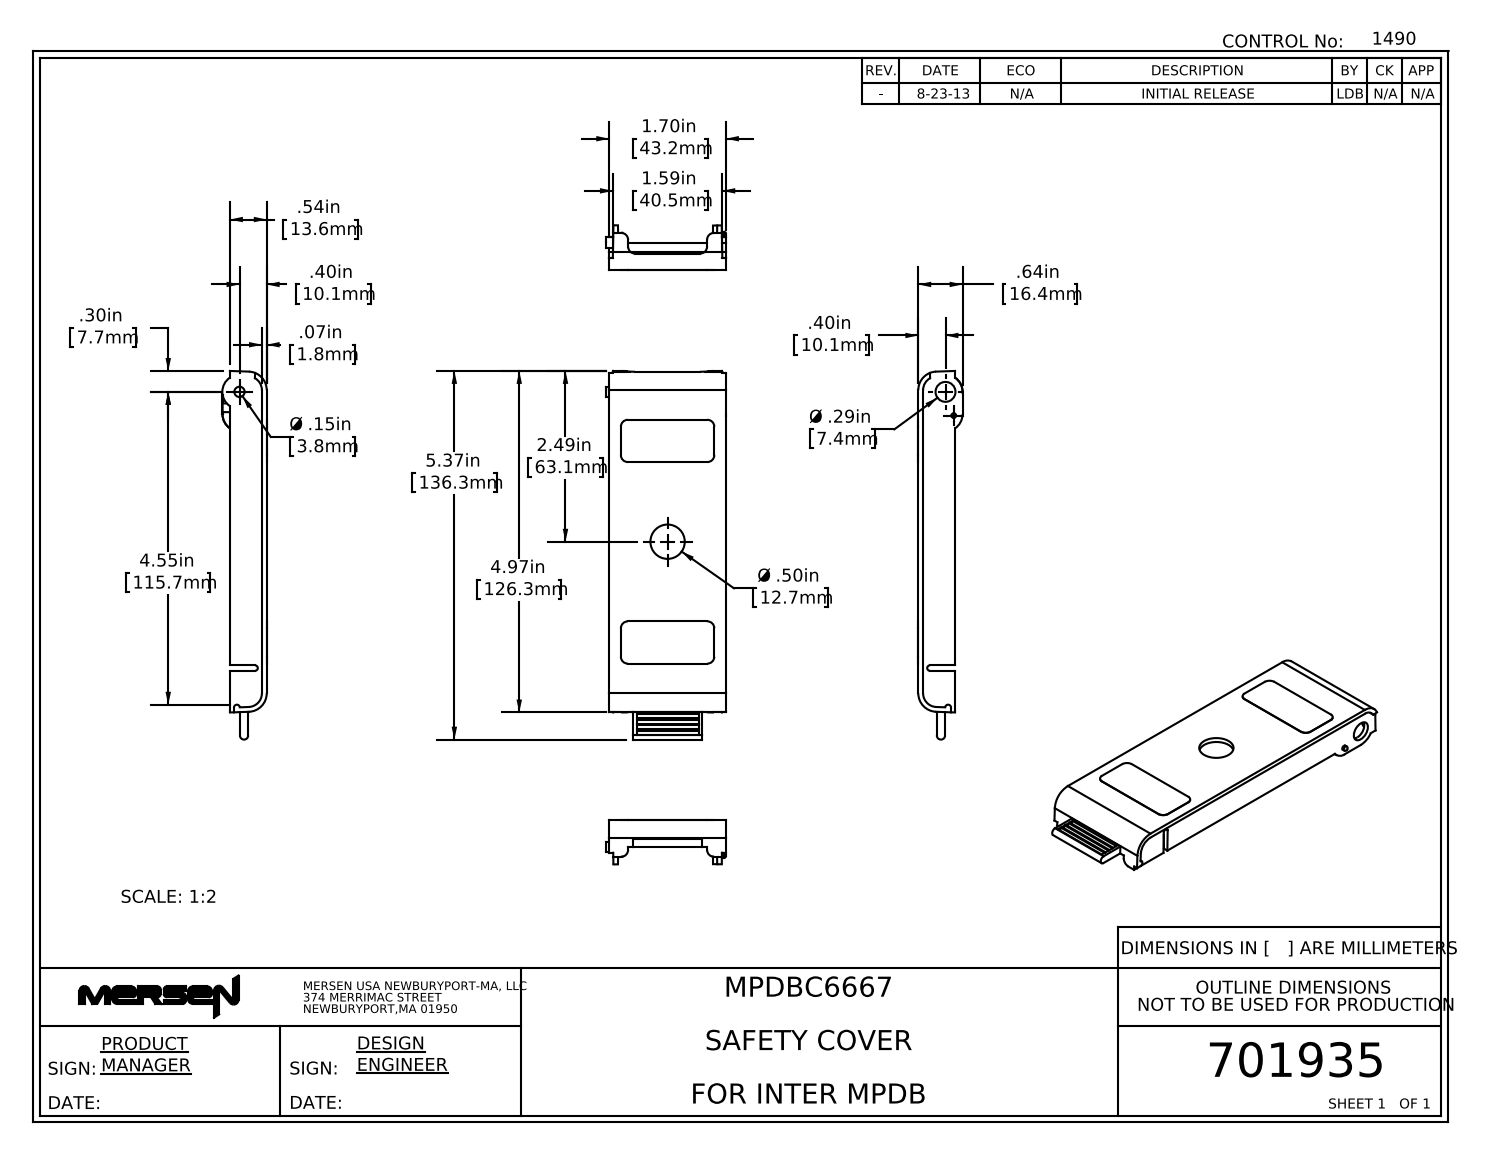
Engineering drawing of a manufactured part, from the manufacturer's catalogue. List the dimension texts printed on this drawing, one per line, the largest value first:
5.37in 136.3mm
4.97in 126.3mm
4.55in 115.7mm
2.49in 63.1mm
1.70in 43.2mm
1.59in 40.5mm
.64in 16.4mm
.54in 13.6mm
Ø .50in 12.7mm
.40in 10.1mm
.40in 10.1mm
.30in 7.7mm
Ø .29in 7.4mm
Ø .15in 3.8mm
.07in 1.8mm
